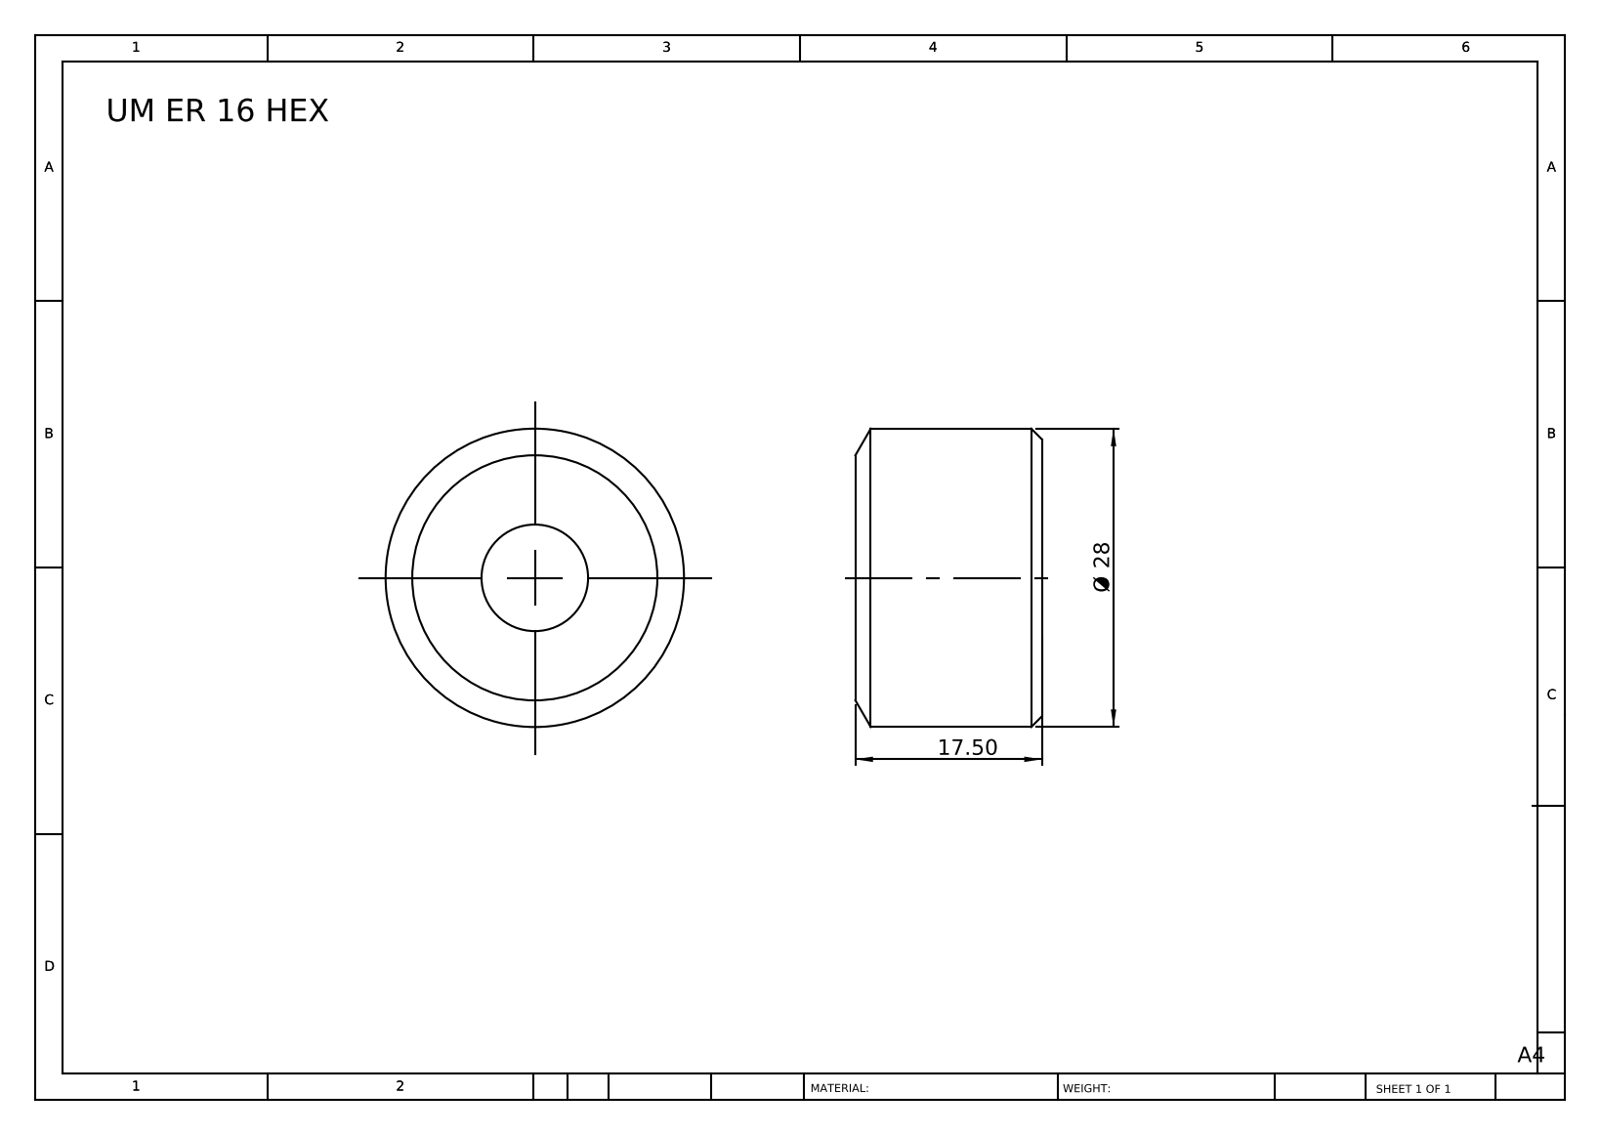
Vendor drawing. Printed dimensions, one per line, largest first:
Ø 28
17.50
